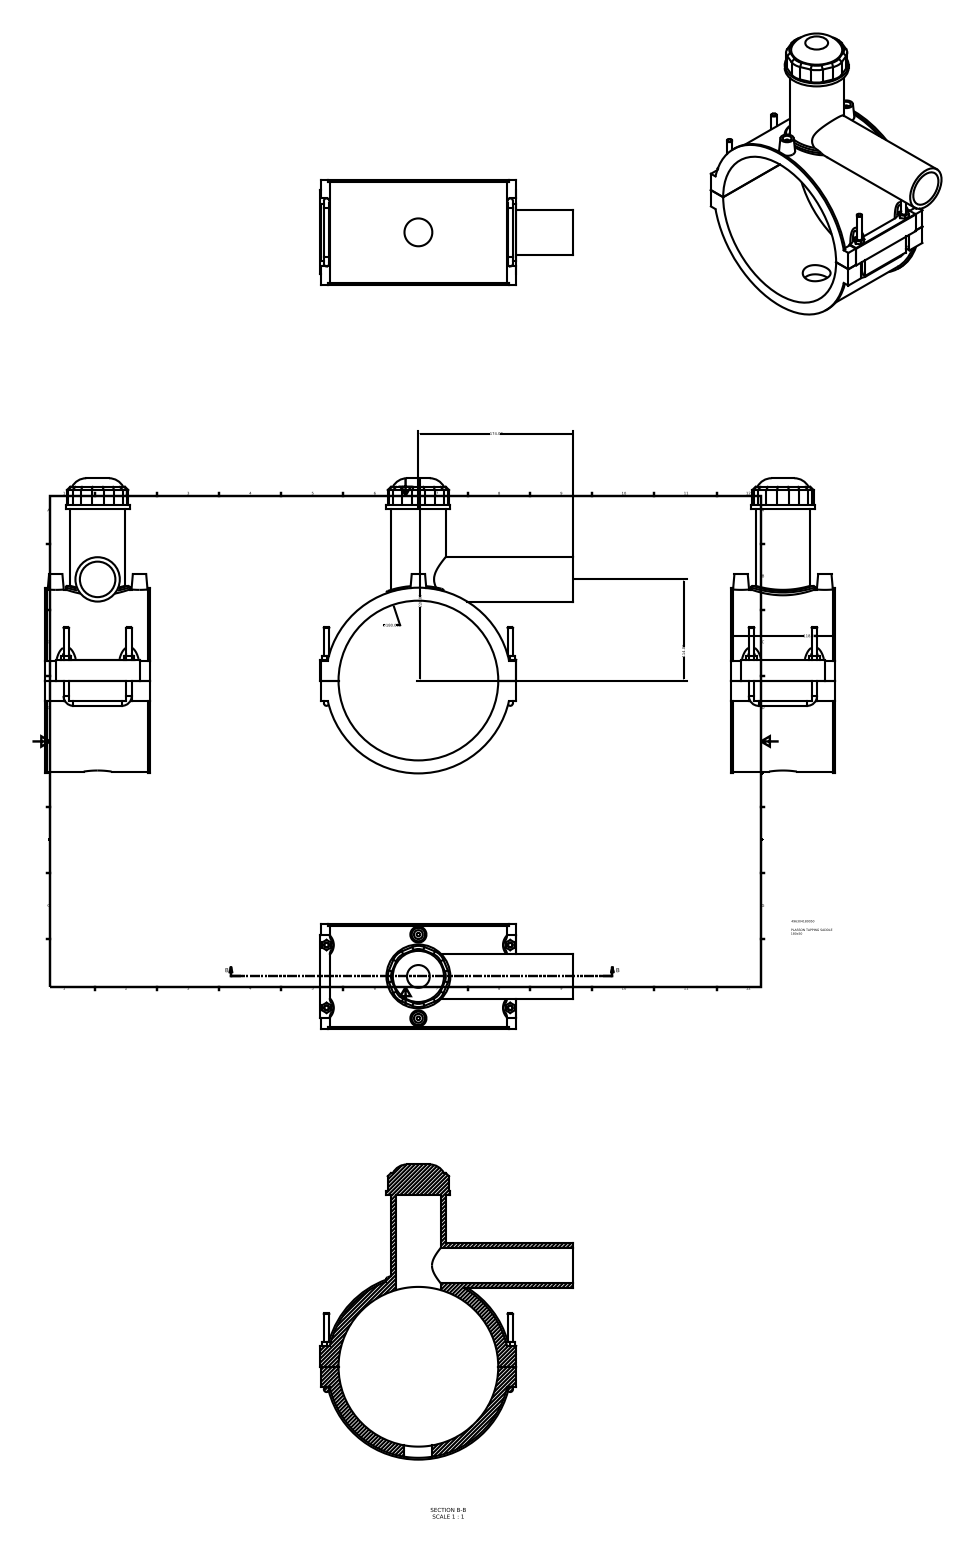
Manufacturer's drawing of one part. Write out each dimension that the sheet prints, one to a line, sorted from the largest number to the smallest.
228.00
∅180.00
174.00
118.00
114.00
